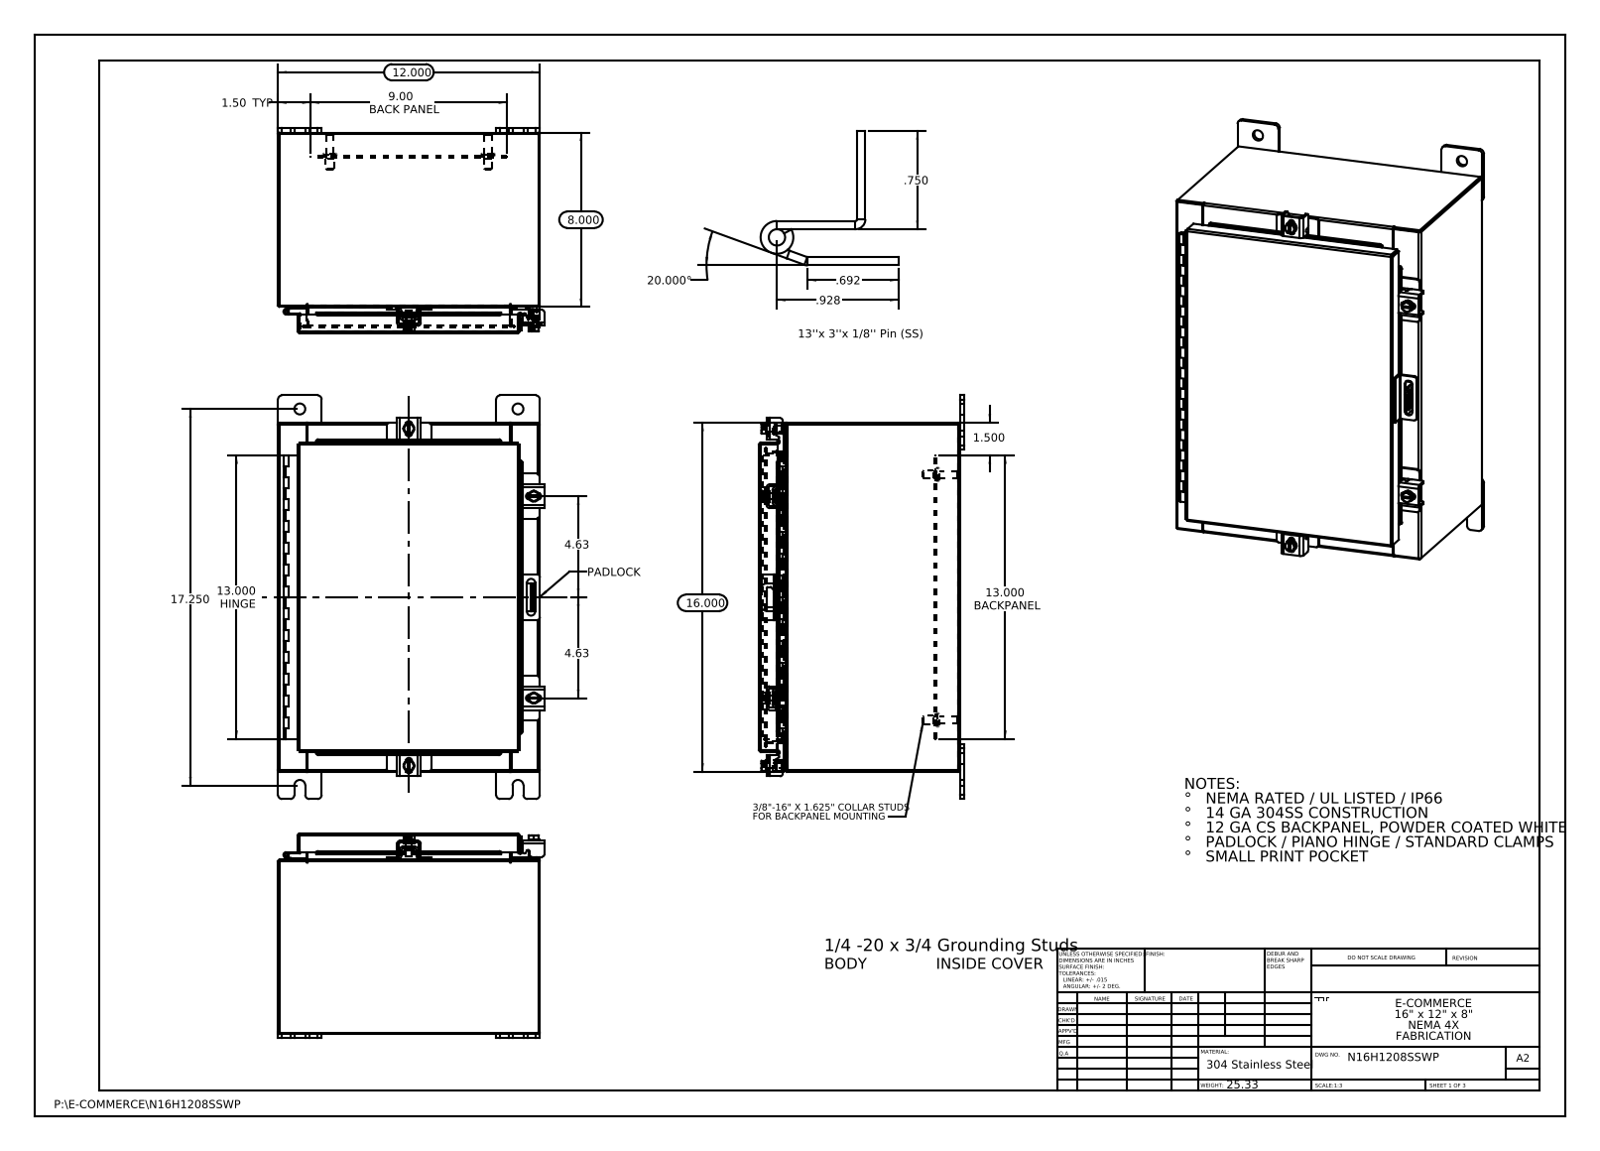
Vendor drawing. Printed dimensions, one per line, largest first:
20.000°
17.250
16.000
13.000 HINGE
13.000 BACKPANEL
12.000
9.00 BACK PANEL
8.000
4.63
4.63
1.50 TYP
1.500
.928
.750
.692
